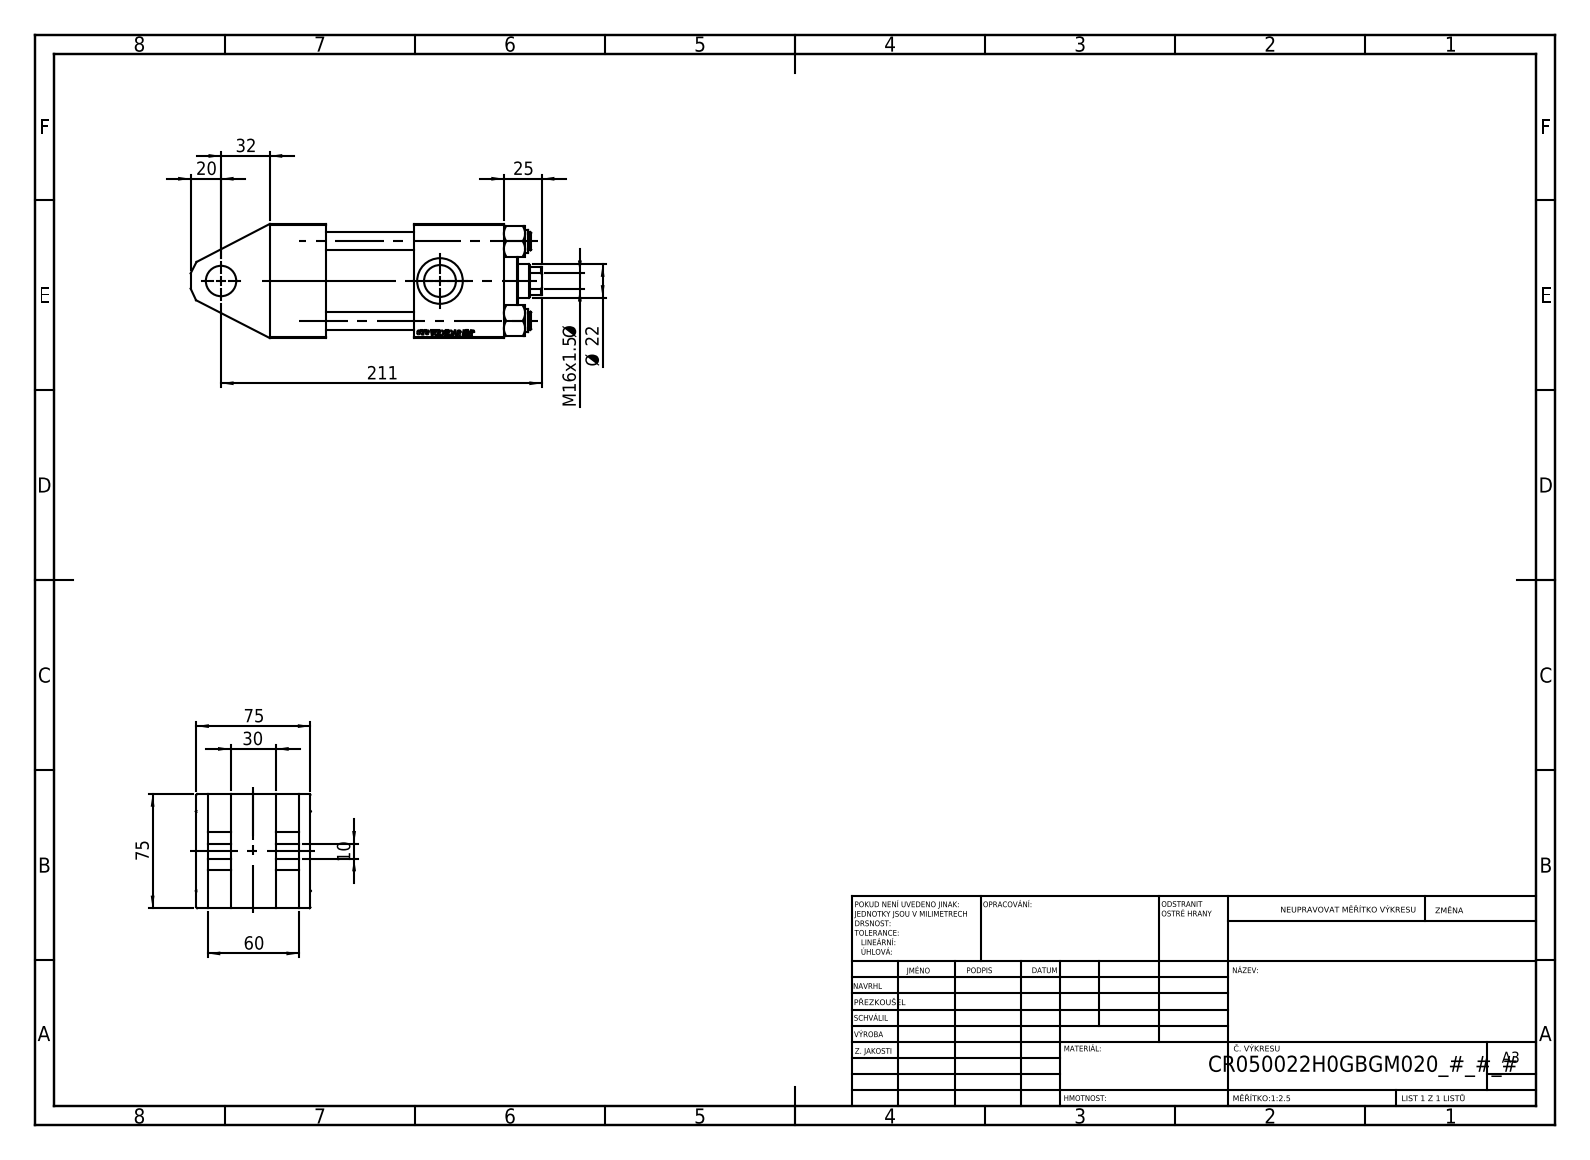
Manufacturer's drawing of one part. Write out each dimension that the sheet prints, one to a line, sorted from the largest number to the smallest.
211
75
75
60
32
30
25
Ø 22
20
M16x1.5 Ø
10
